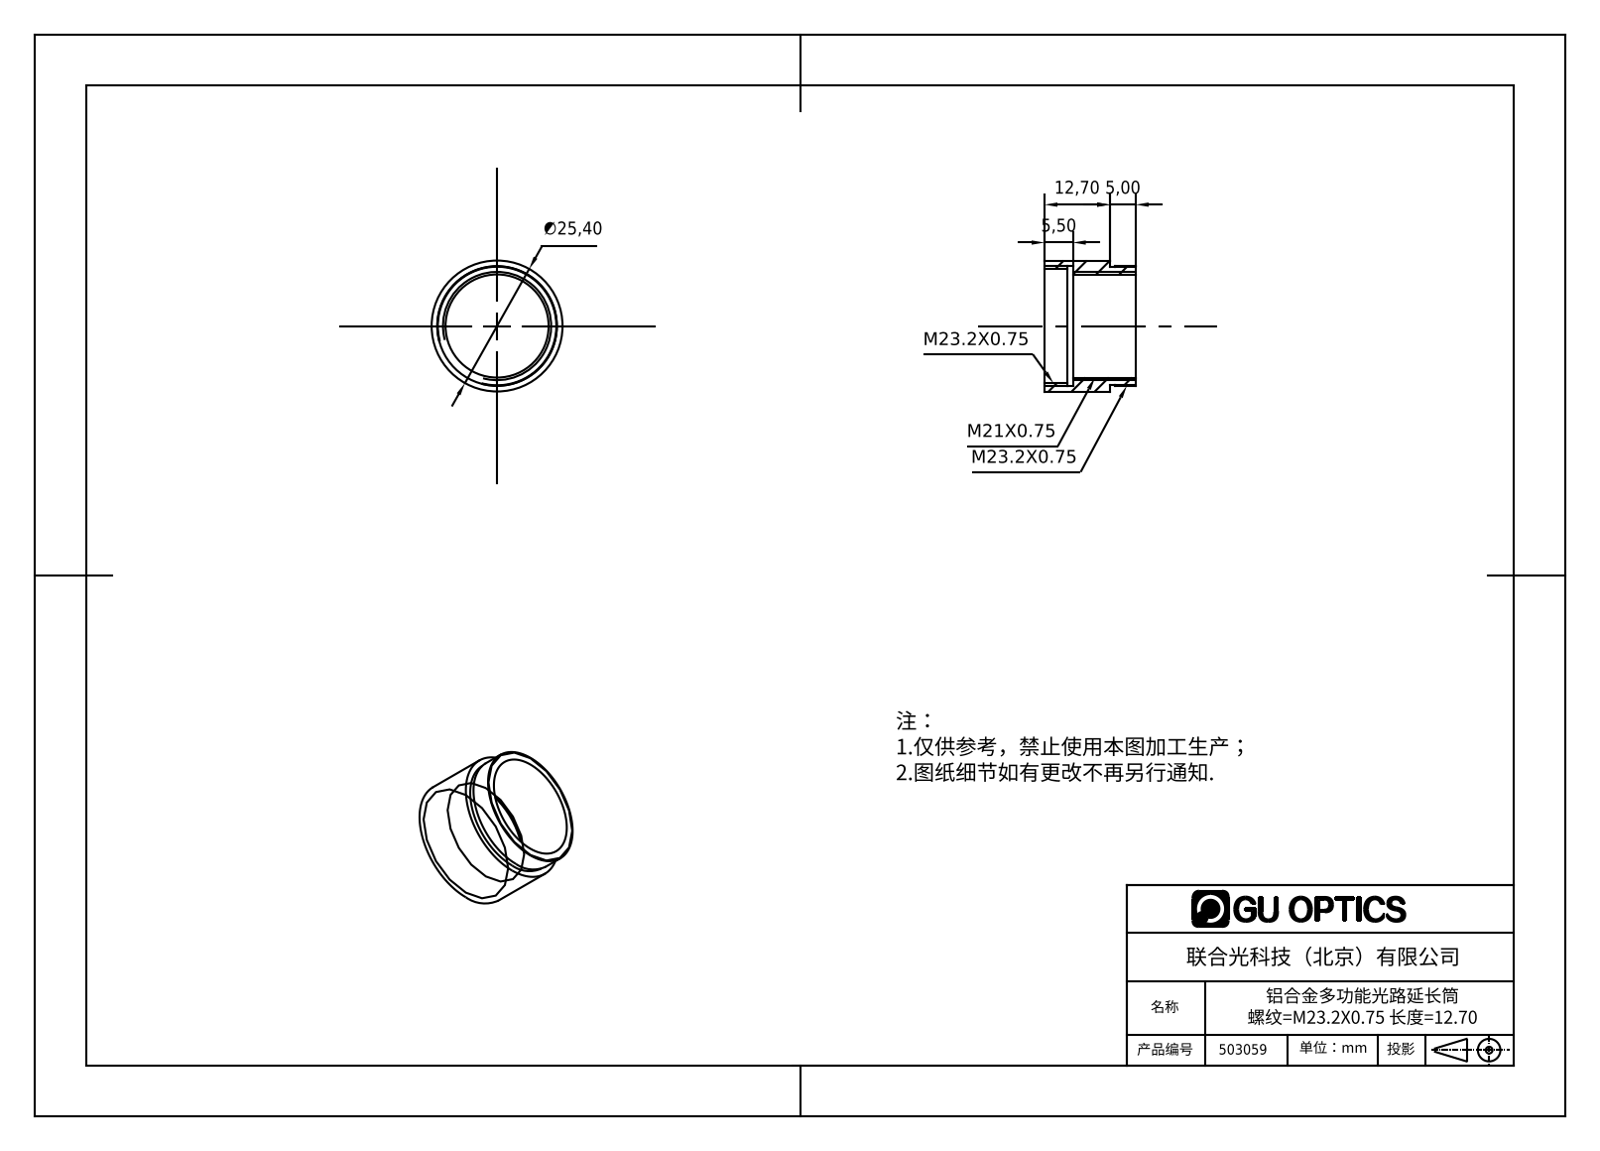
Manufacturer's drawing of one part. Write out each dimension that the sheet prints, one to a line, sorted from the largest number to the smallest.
∅25,40
12,70
5,50
5,00
